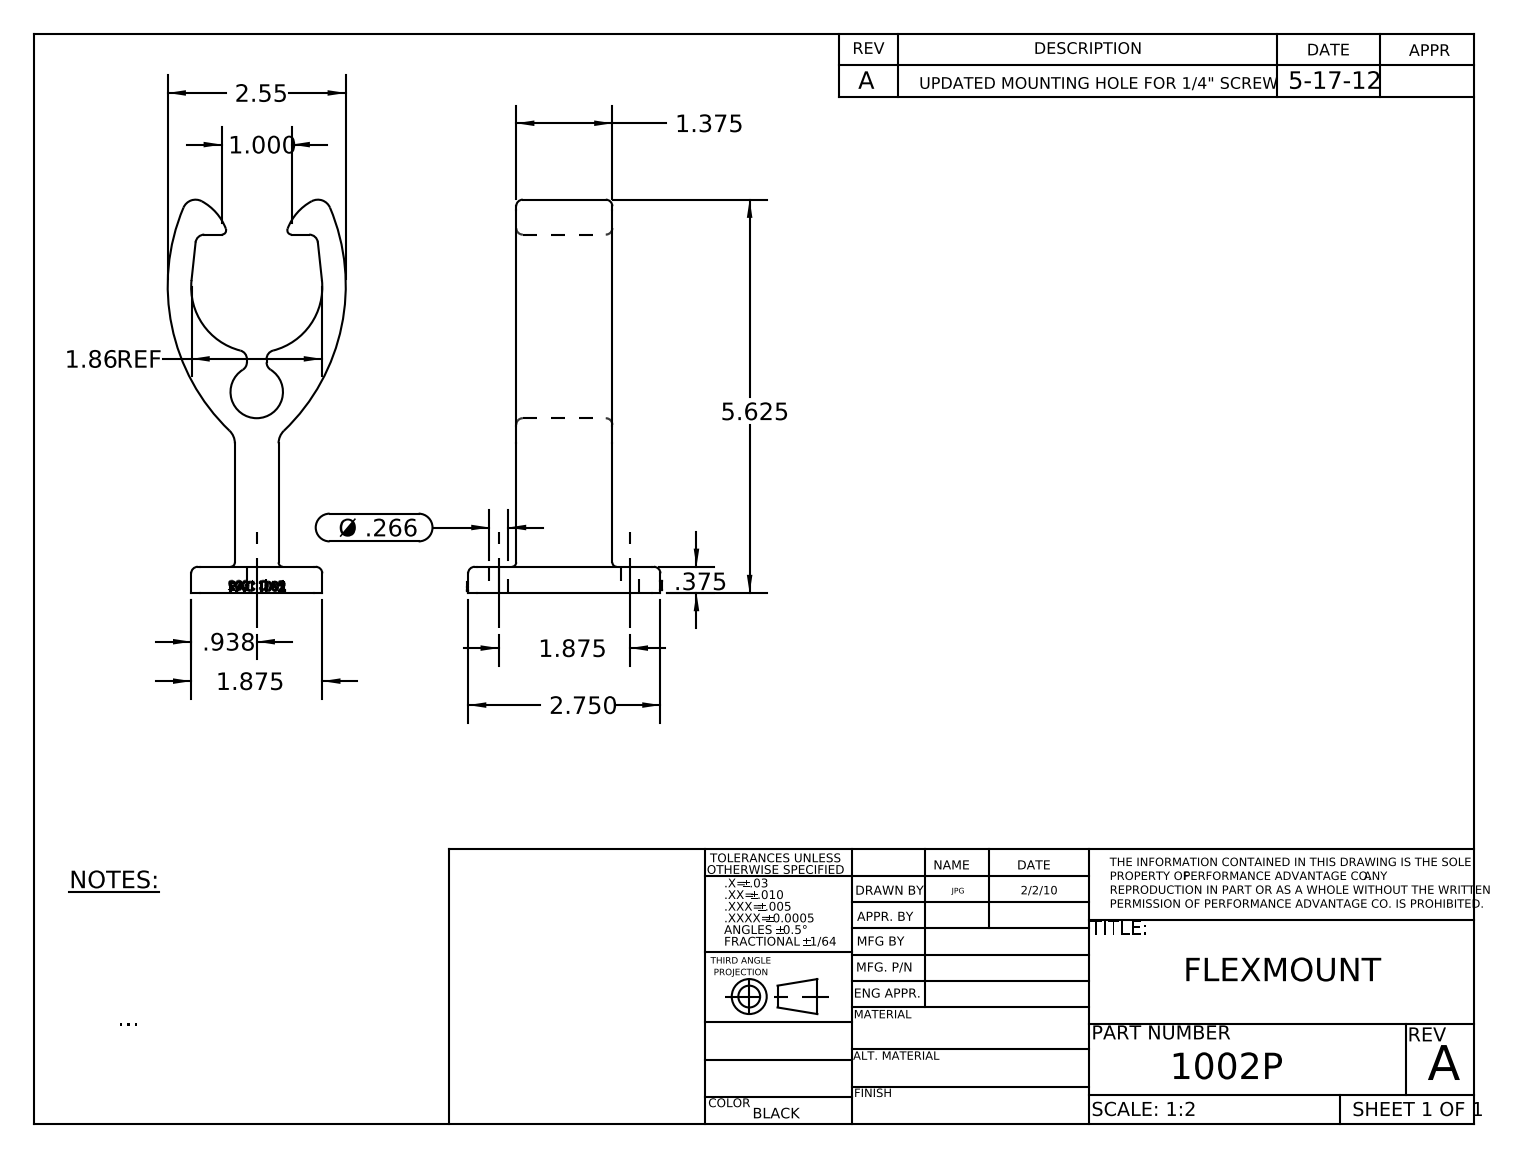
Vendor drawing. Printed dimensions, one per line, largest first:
5.625
2.750
2.55
1.875
1.875
1.86 REF
1.375
1.000
.938
.375
Ø .266
